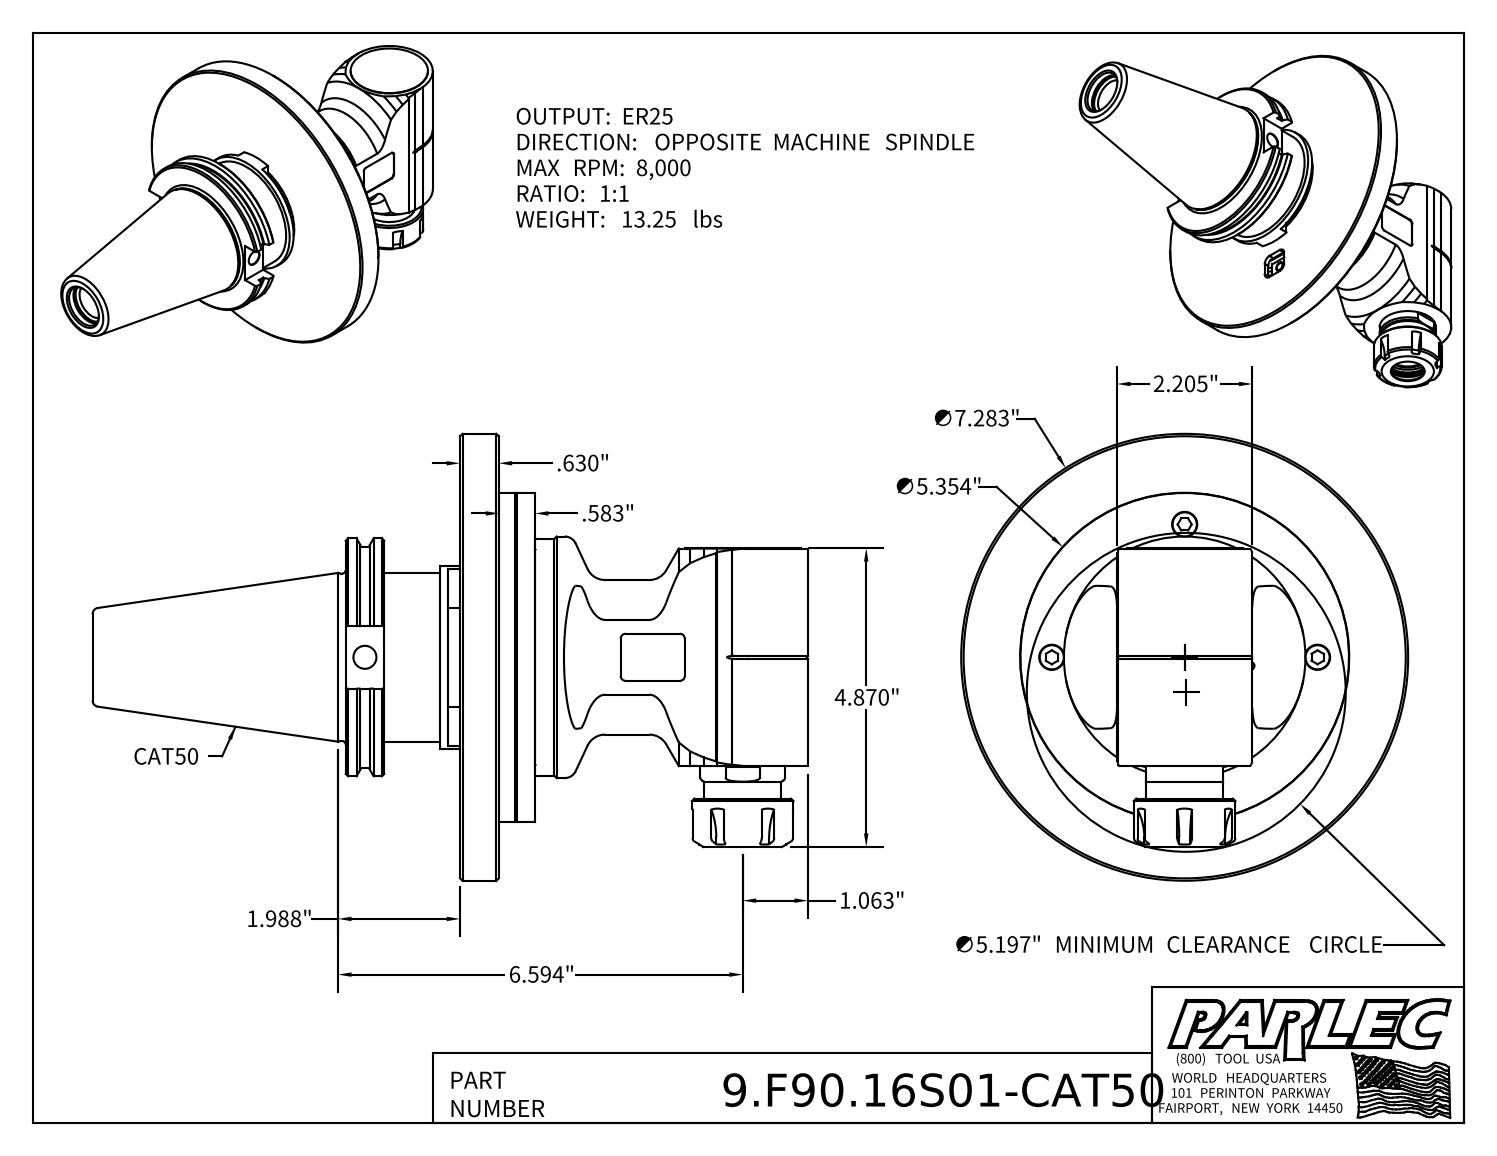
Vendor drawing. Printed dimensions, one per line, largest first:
∅7.283"
6.594"
∅5.354"
∅5.197" MINIMUM CLEARANCE CIRCLE
4.870"
2.205"
1.988"
1.063"
.630"
.583"
